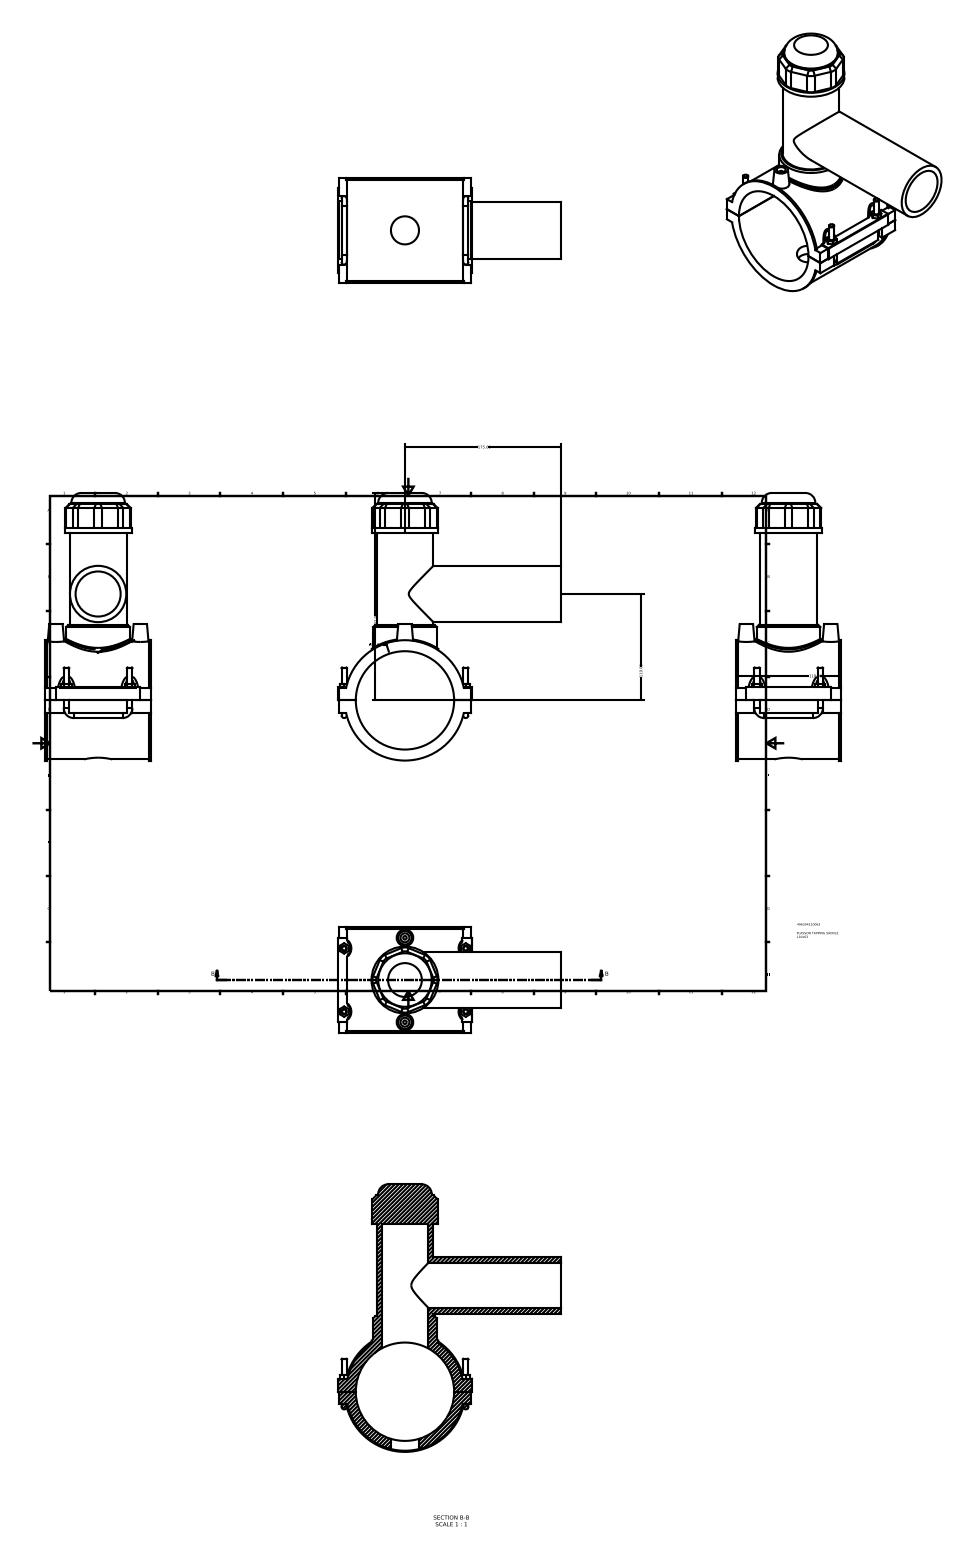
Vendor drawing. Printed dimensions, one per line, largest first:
232.00
175.00
119.00
118.00
∅110.00
